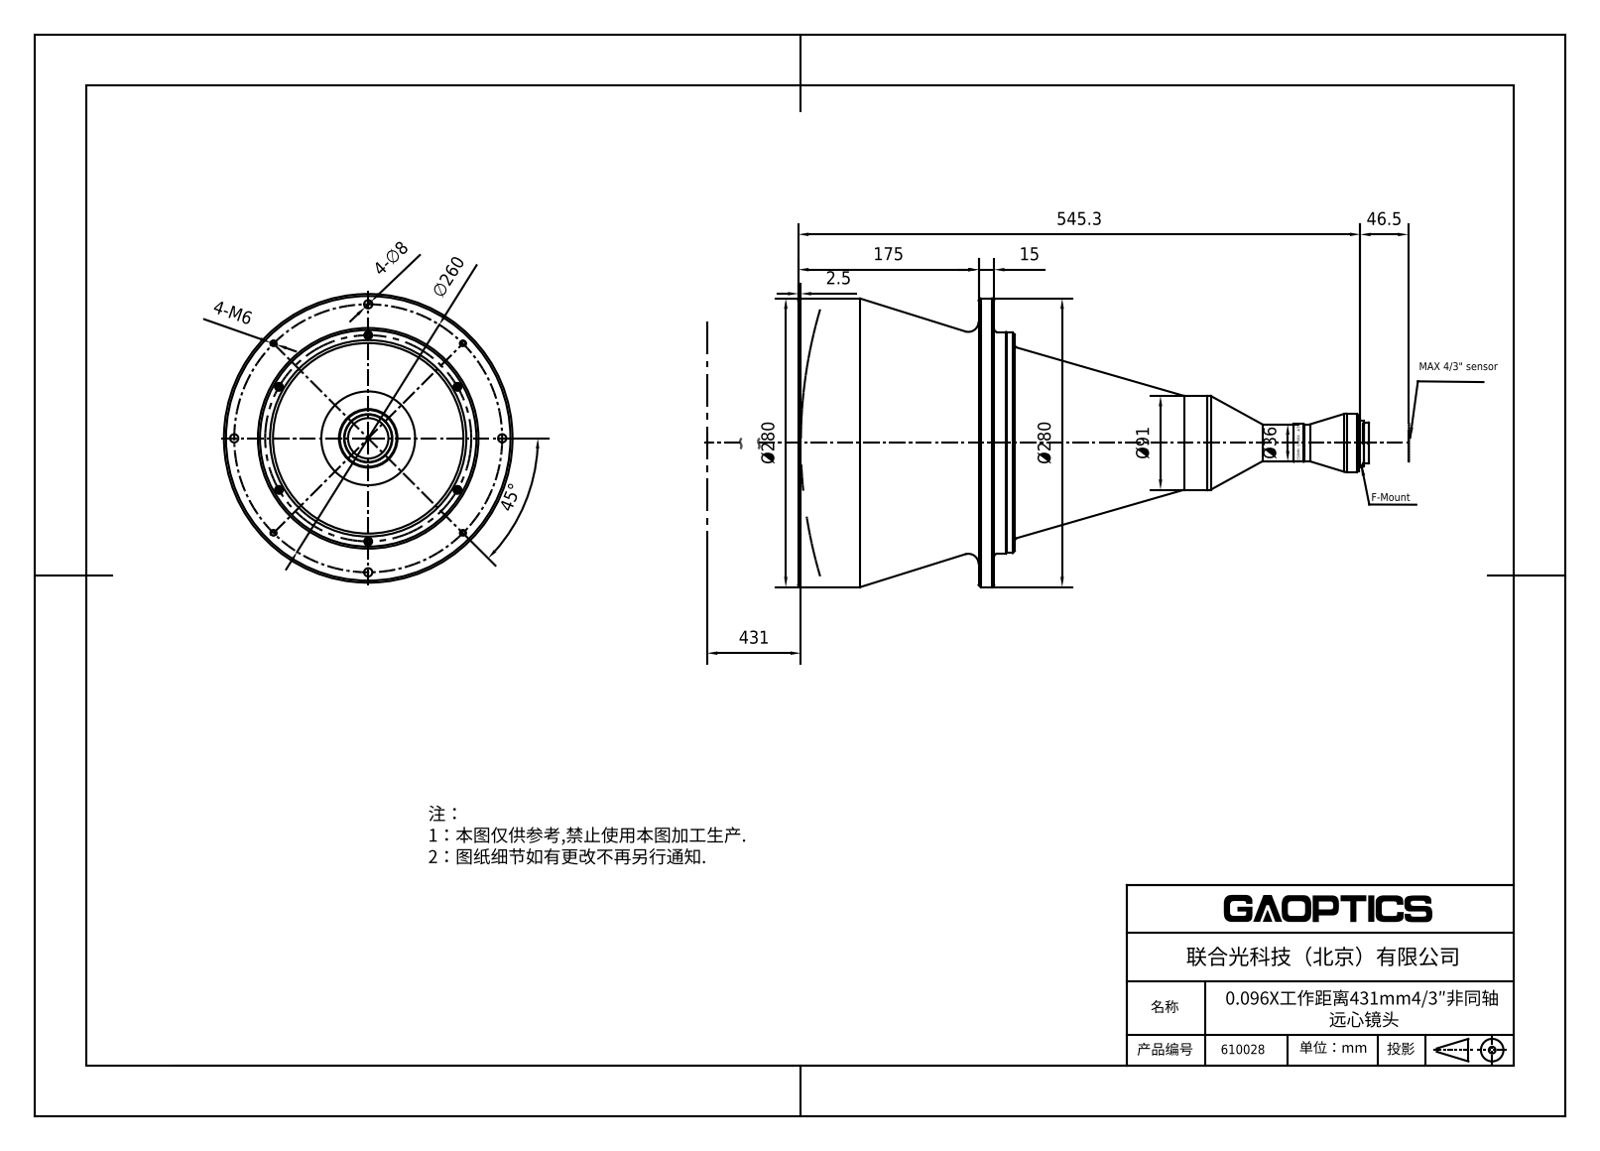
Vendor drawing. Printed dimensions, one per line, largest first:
545.3
431
Ø280
Ø280
∅260
175
Ø91
46.5
45°
Ø36
15
4-∅8
4-M6
2.5
